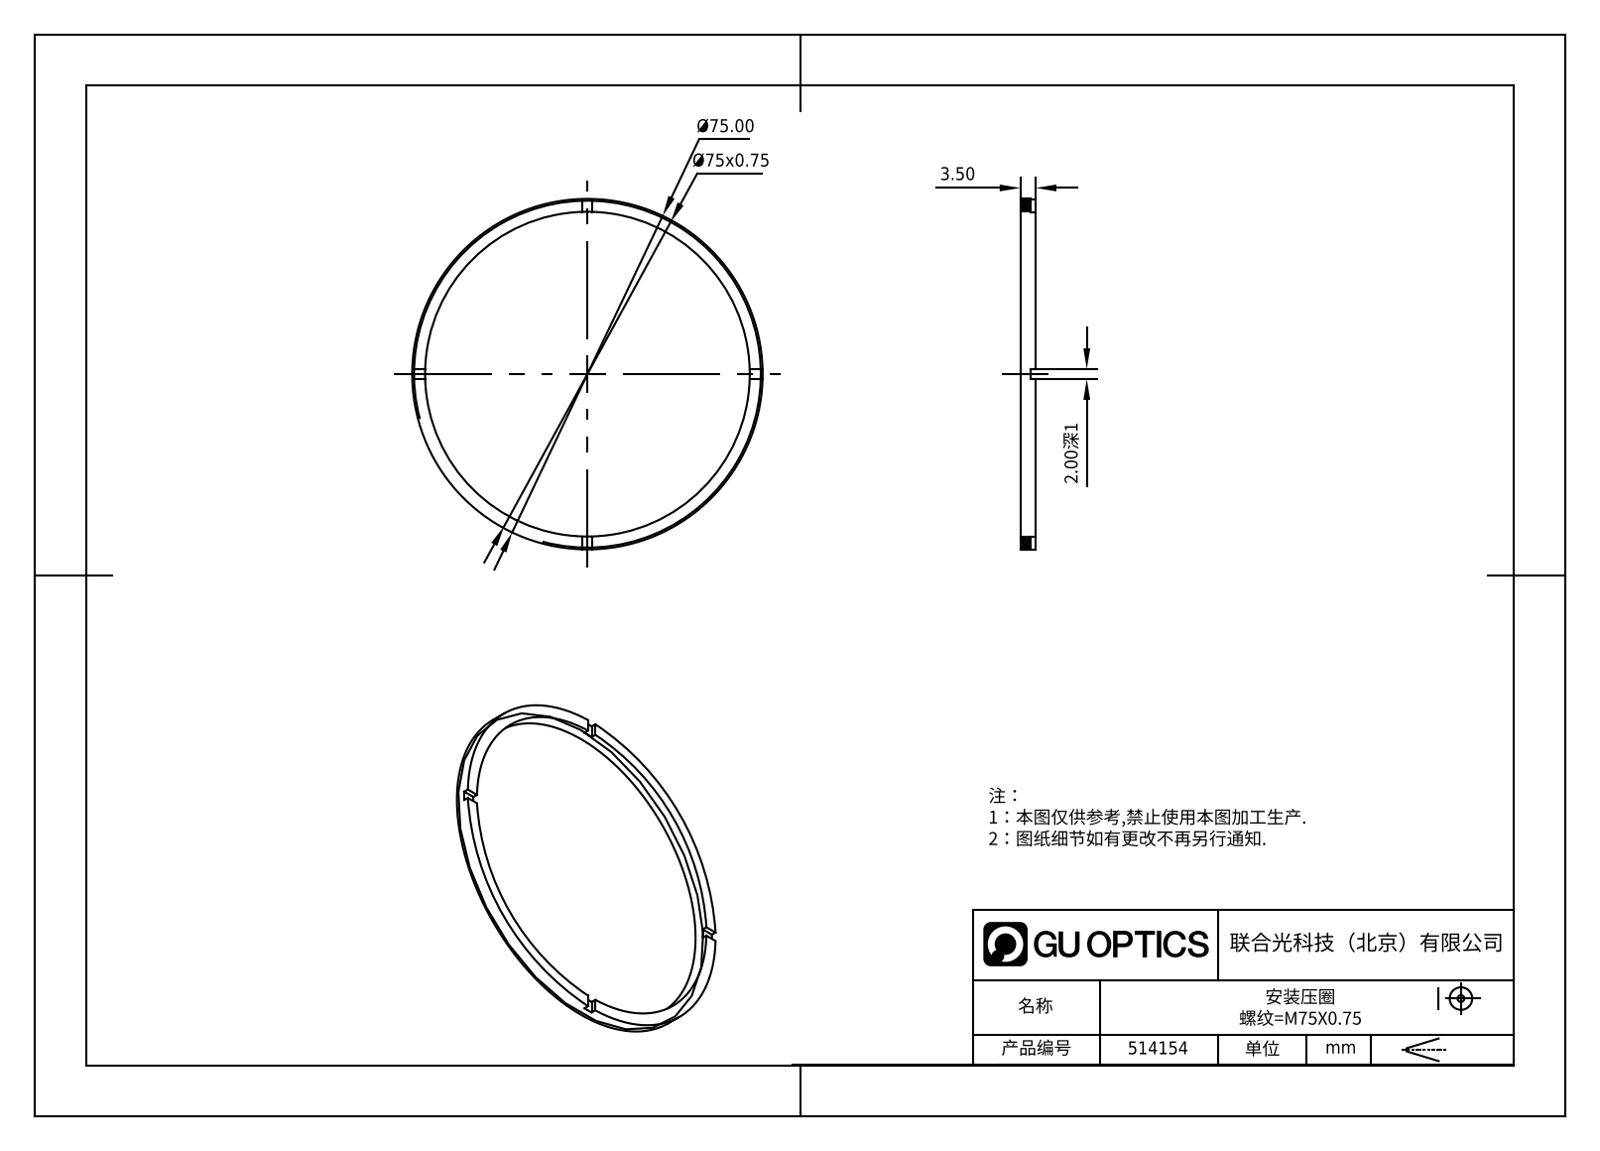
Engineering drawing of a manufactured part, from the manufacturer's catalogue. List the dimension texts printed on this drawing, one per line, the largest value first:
Ø75.00
Ø75x0.75
3.50
2.00深1
